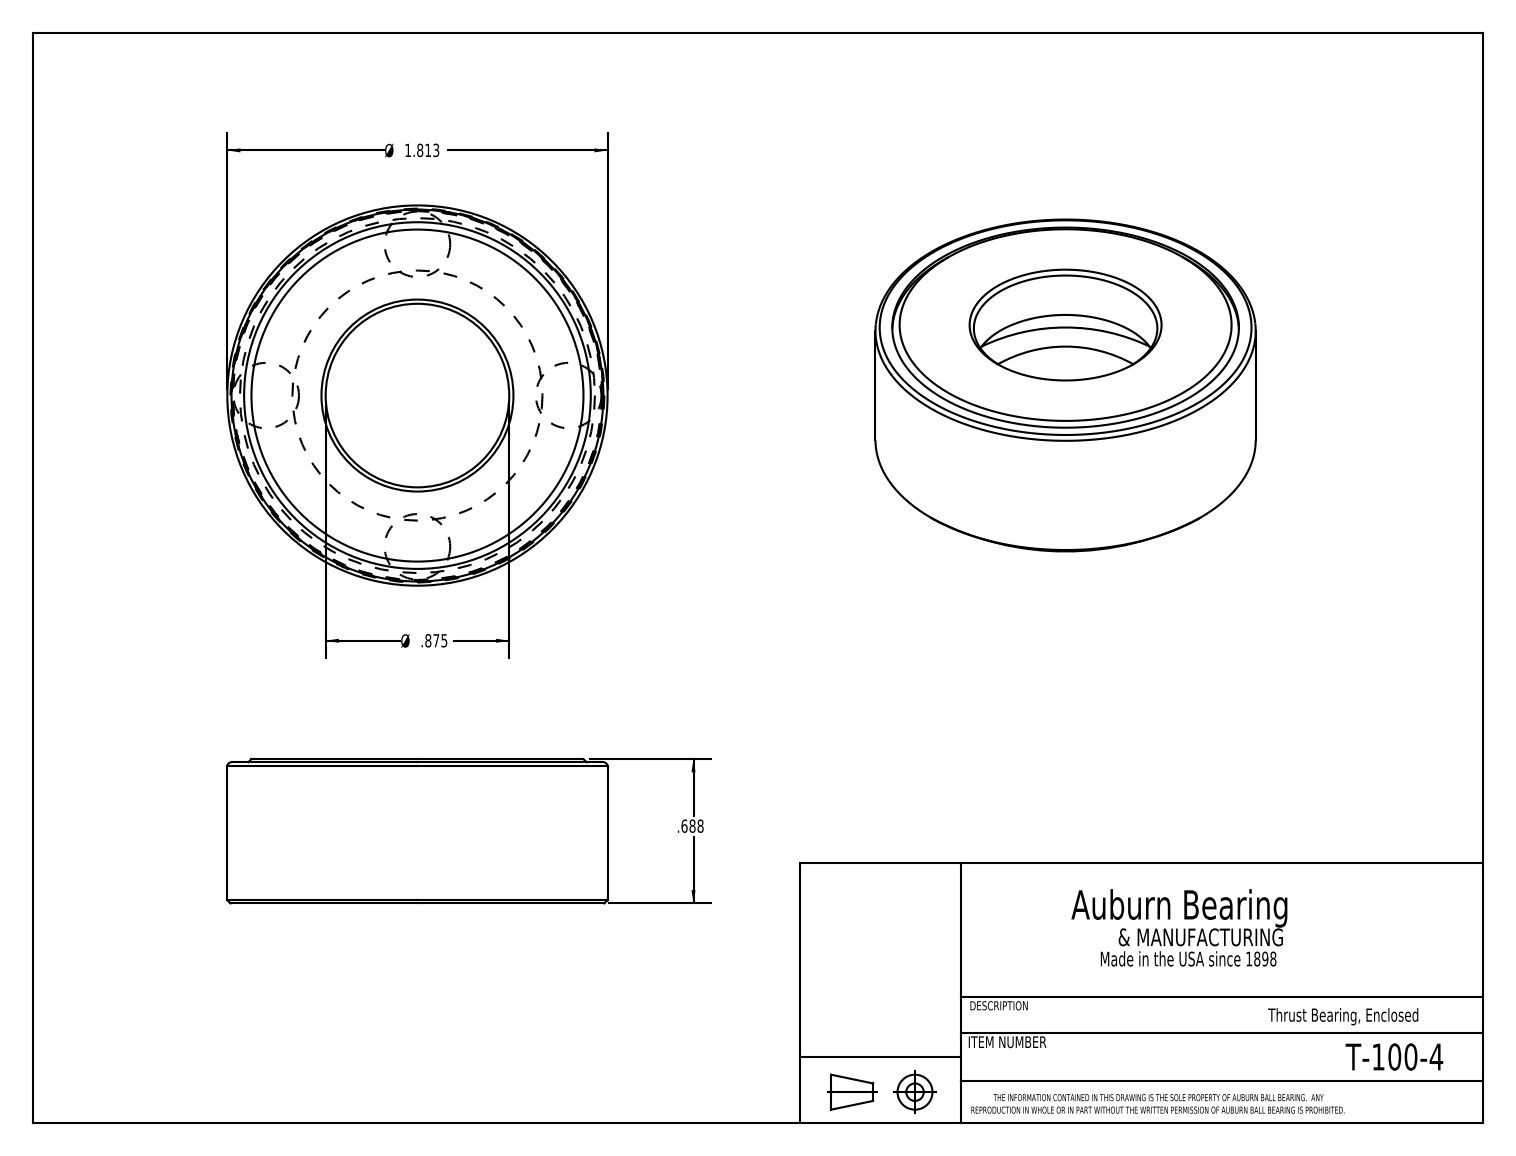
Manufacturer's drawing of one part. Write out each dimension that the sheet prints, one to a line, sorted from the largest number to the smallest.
Ø 1.813
Ø .875
.688
